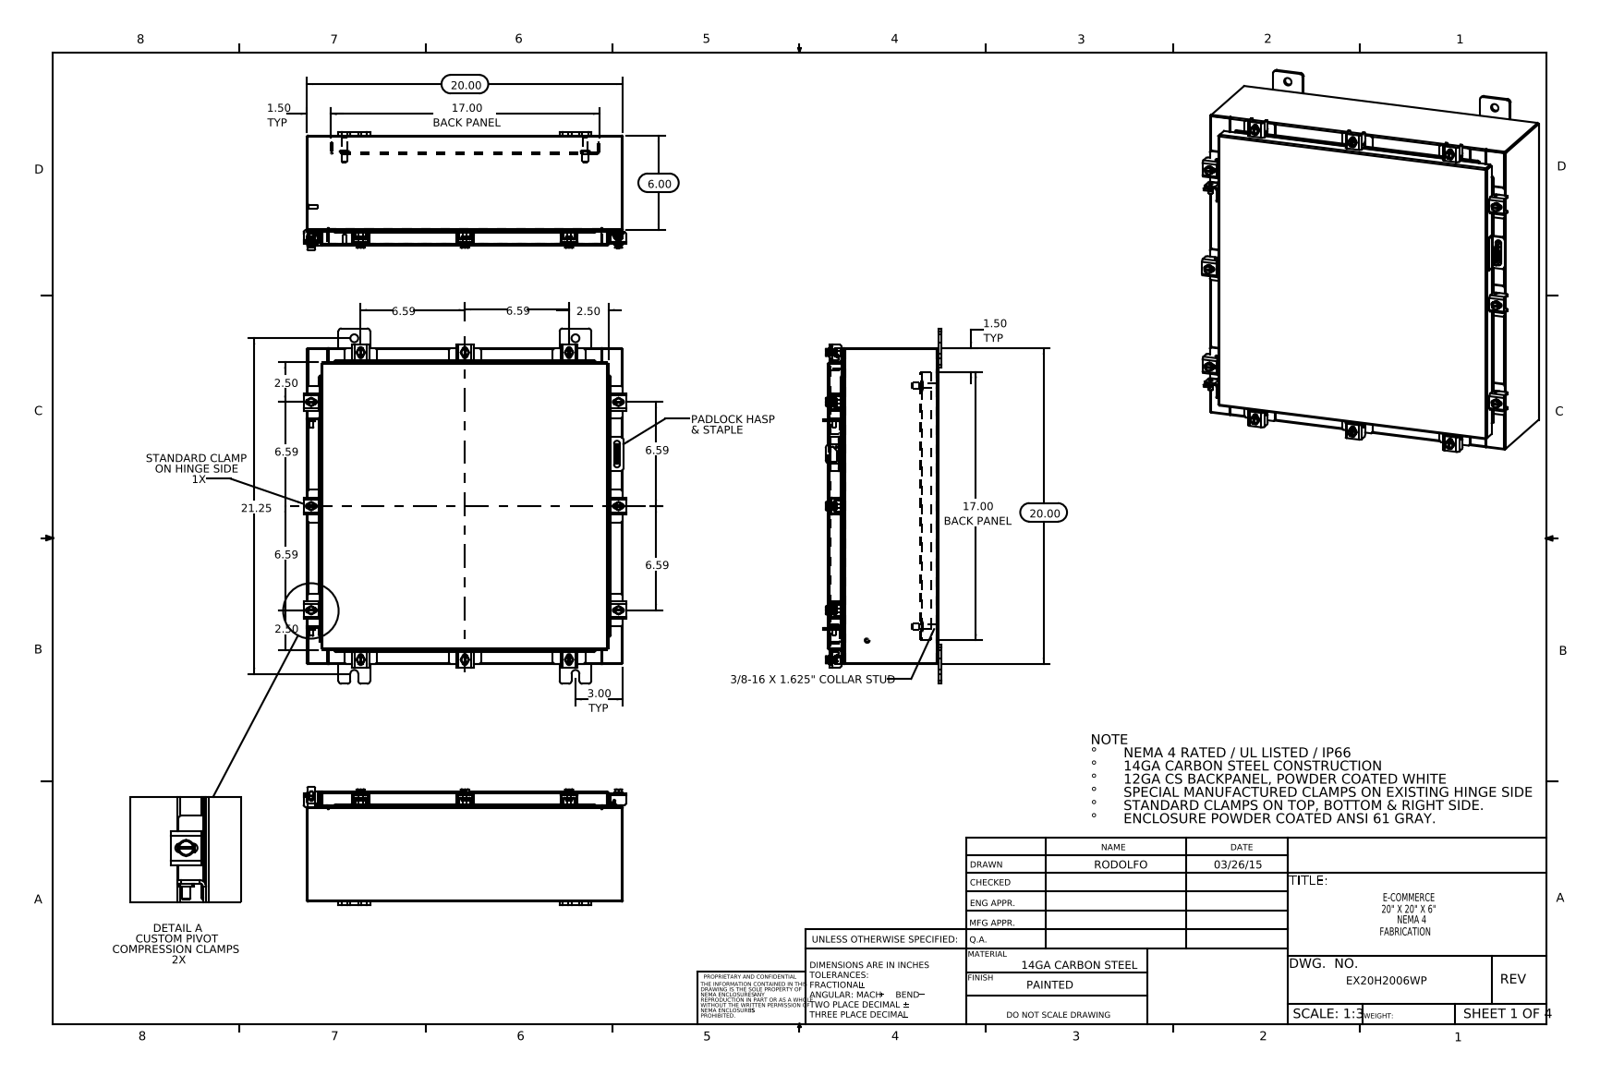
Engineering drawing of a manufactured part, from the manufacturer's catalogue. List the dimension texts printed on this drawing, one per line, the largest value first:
21.25
20.00
20.00
17.00 BACK PANEL
17.00 BACK PANEL
6.59
6.59
6.59
6.59
6.59
6.59
6.00
3.00 TYP
2.50
2.50
2.50
1.50 TYP
1.50 TYP
